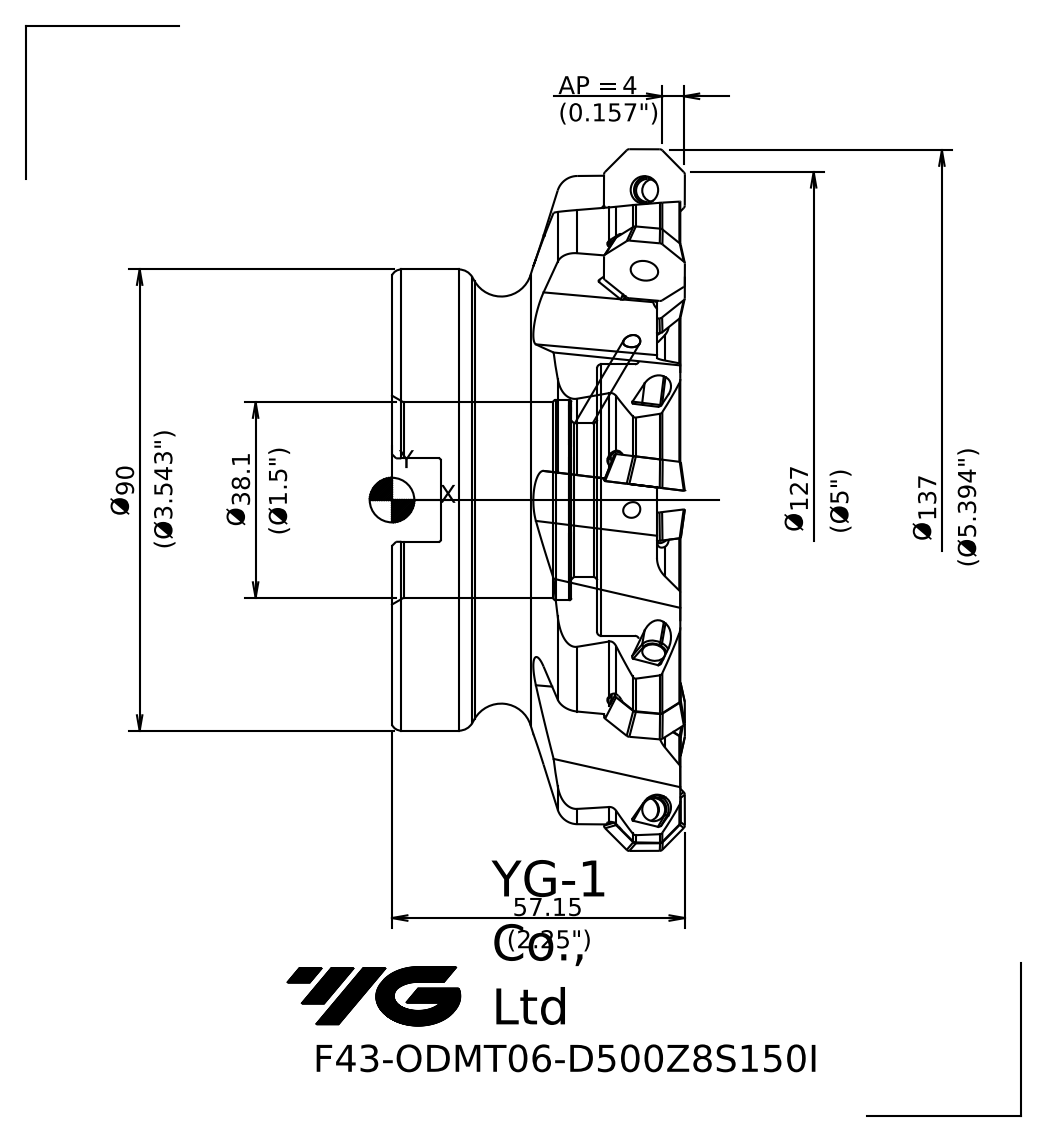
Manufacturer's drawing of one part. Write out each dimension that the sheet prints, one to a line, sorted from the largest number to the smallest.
137 Ø
127 Ø
90 Ø
57.15
38.1 Ø
AP = 4
